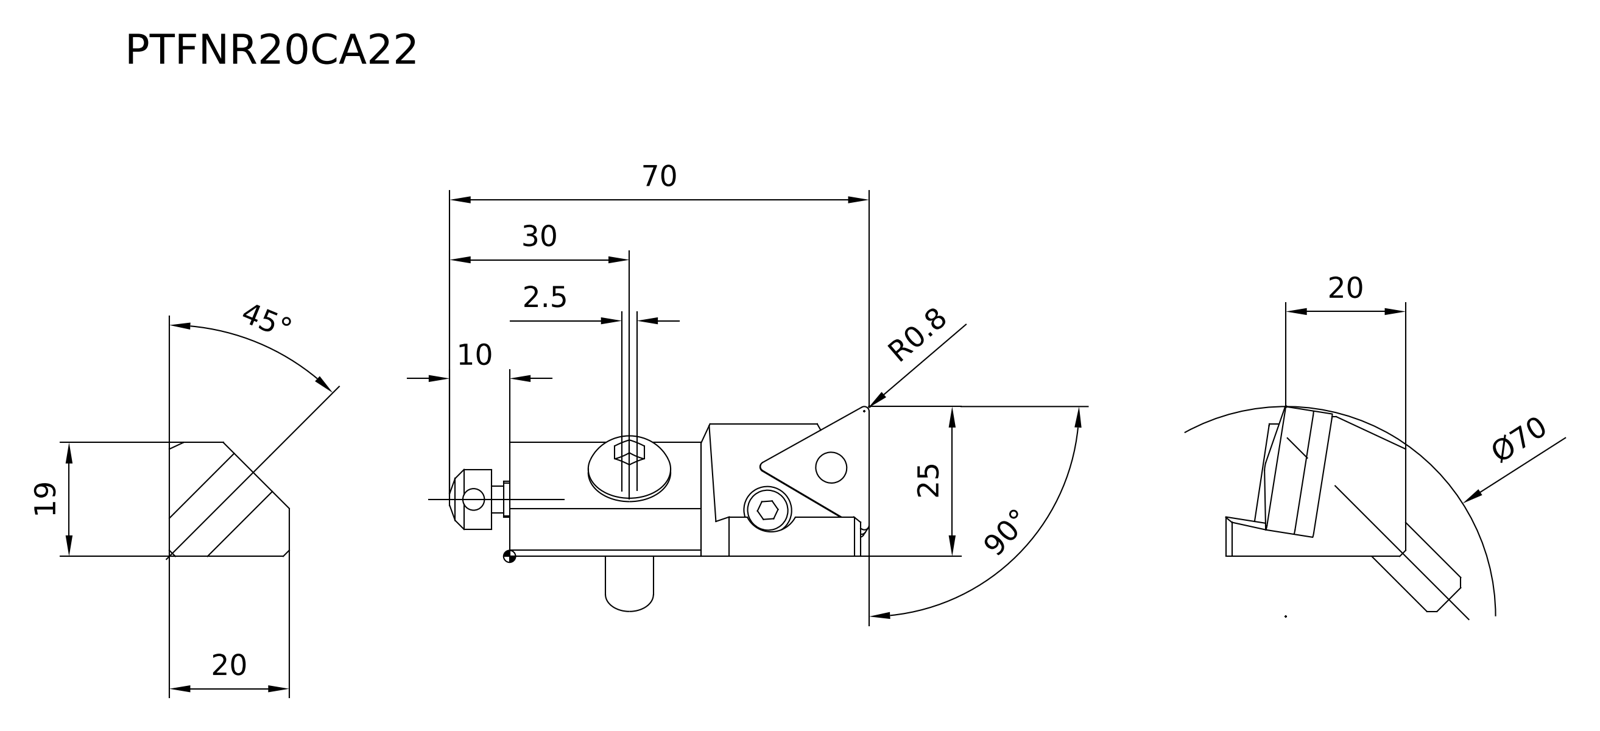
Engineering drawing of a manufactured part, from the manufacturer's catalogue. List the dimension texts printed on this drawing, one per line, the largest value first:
90°
70
Ø70
45°
30
25
20
20
19
10
2.5
R0.8
